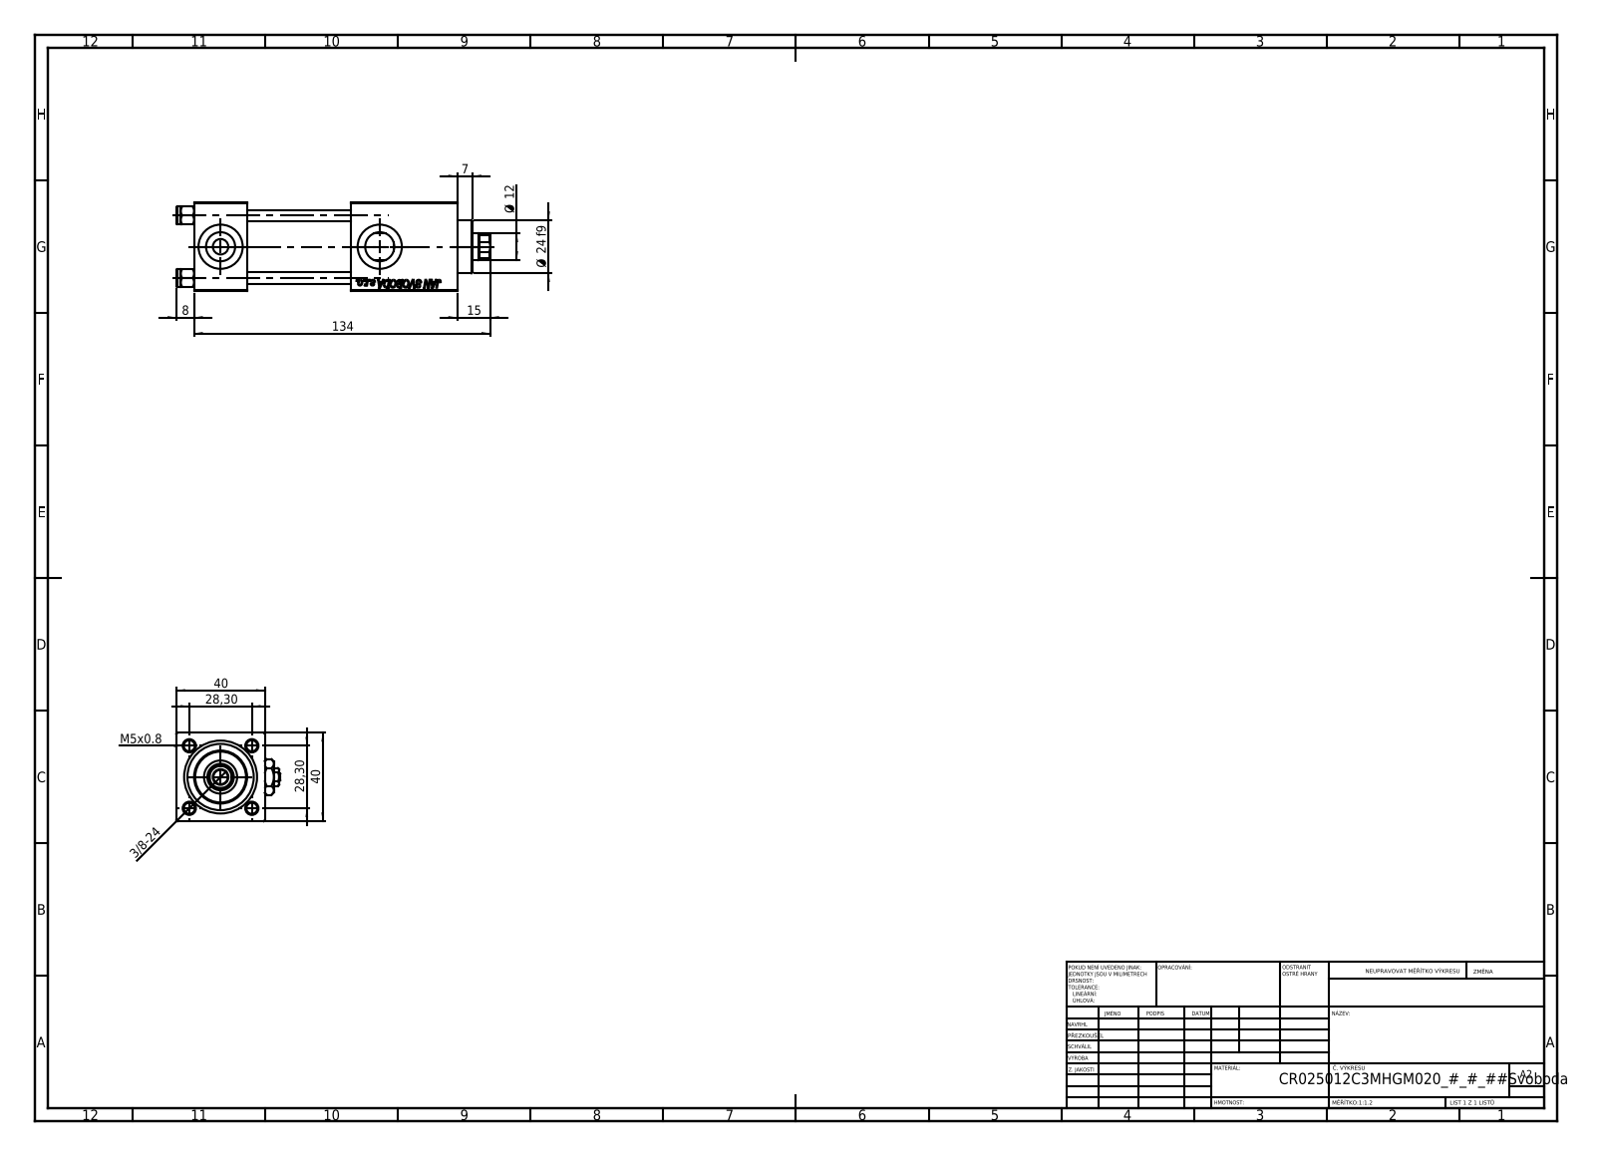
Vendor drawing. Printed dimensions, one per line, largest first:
134
40
40
28,30
28,30
Ø 24 f9
15
Ø 12
8
7
M5x0.8
3/8-24
